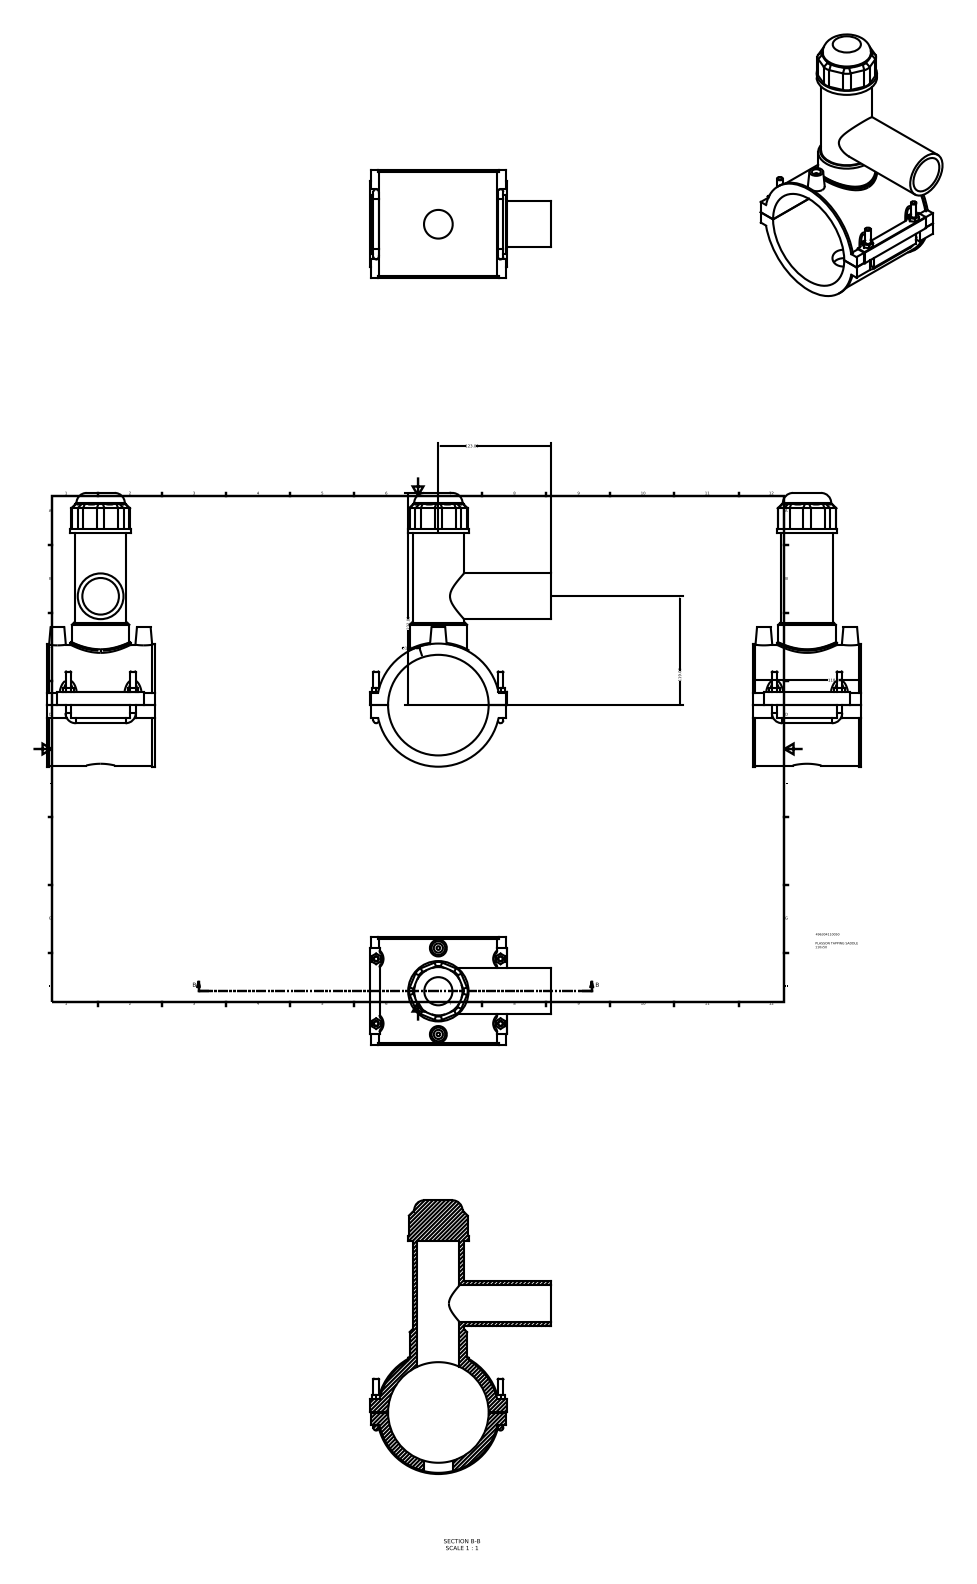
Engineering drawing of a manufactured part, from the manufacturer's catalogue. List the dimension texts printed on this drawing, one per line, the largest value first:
232.00
123.00
119.00
118.00
∅110.00
